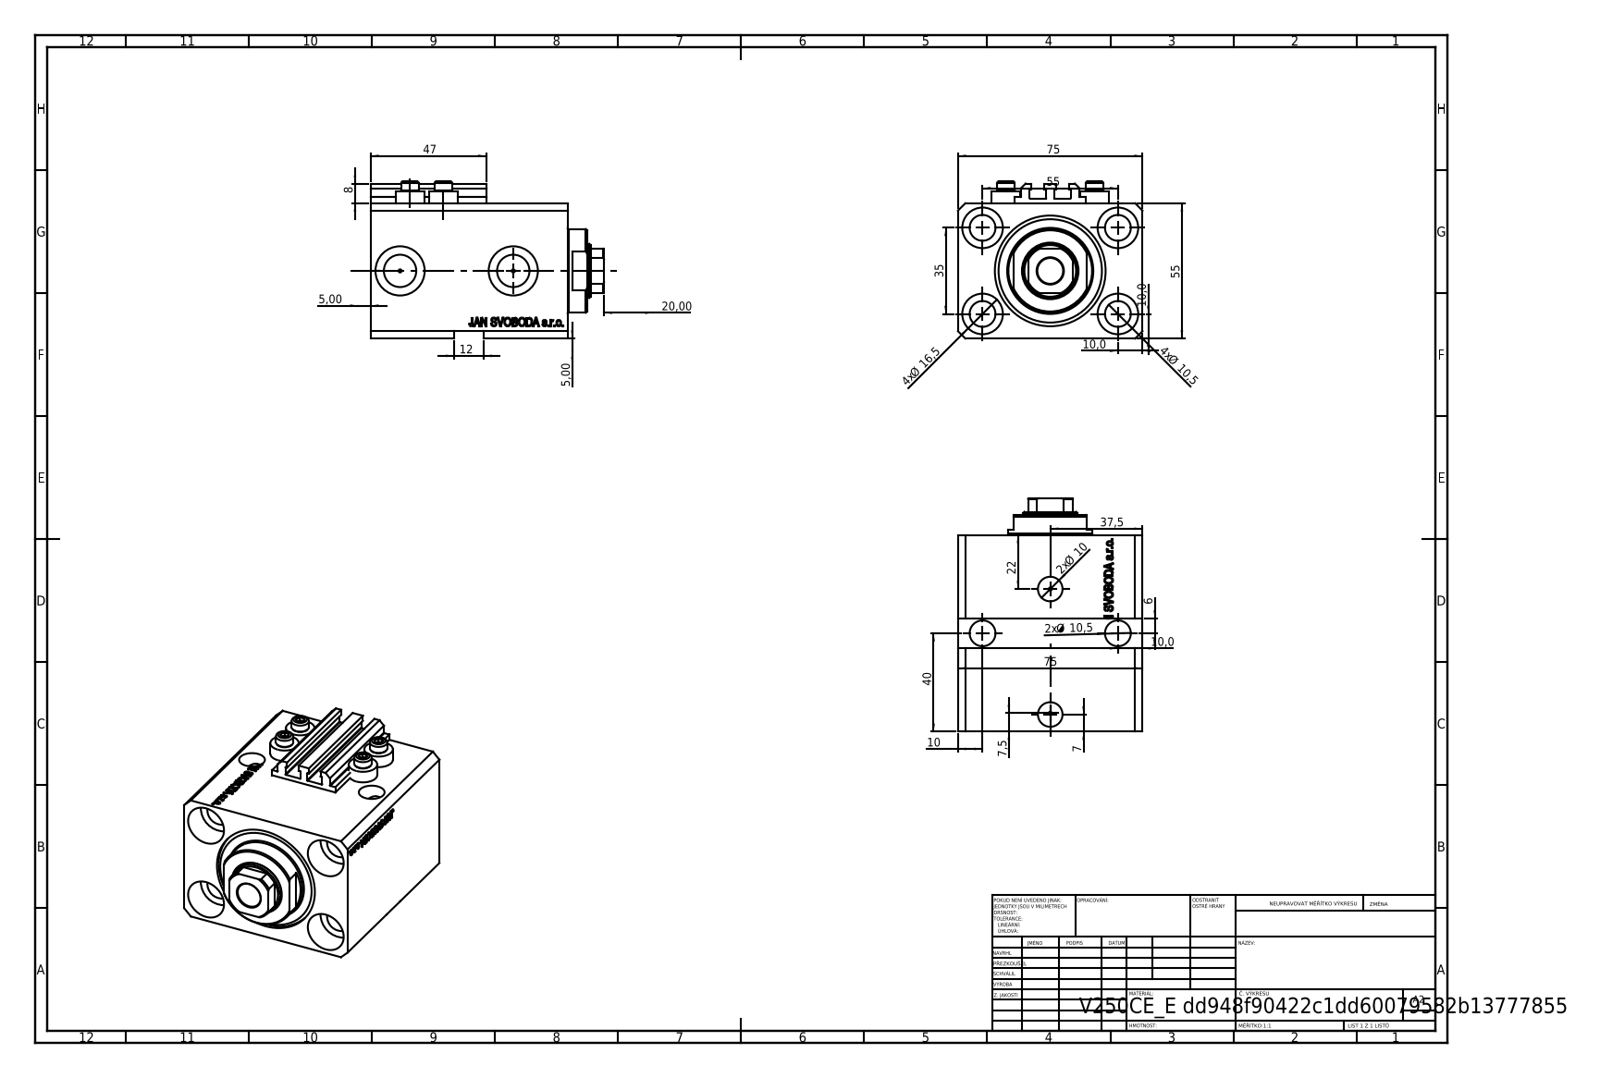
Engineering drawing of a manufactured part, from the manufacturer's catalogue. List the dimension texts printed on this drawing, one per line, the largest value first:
75
75
55
55
47
40
37,5
35
22
20,00
4x Ø 16,5
12
4x Ø 10,5
2x Ø 10,5
10,0
10,0
2x Ø 10
10,0
10
8
7,5
7
6
5,00
5,00
